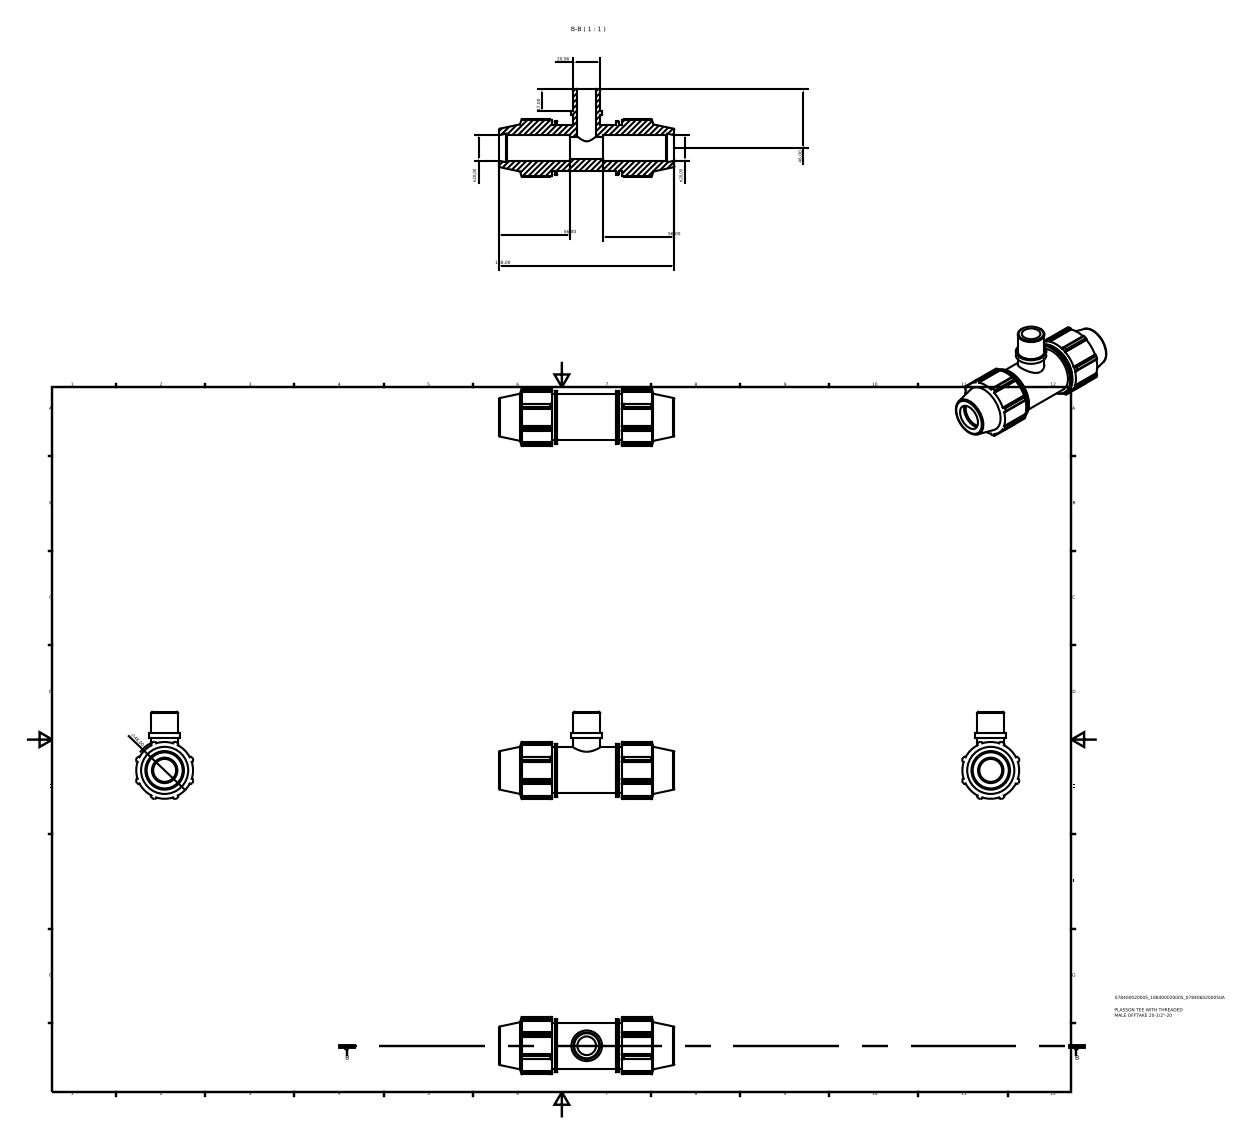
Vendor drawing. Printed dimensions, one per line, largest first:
138,00
56,00
56,00
∅48,00
46,00
20,96
n20,00
n20,00
17,00
